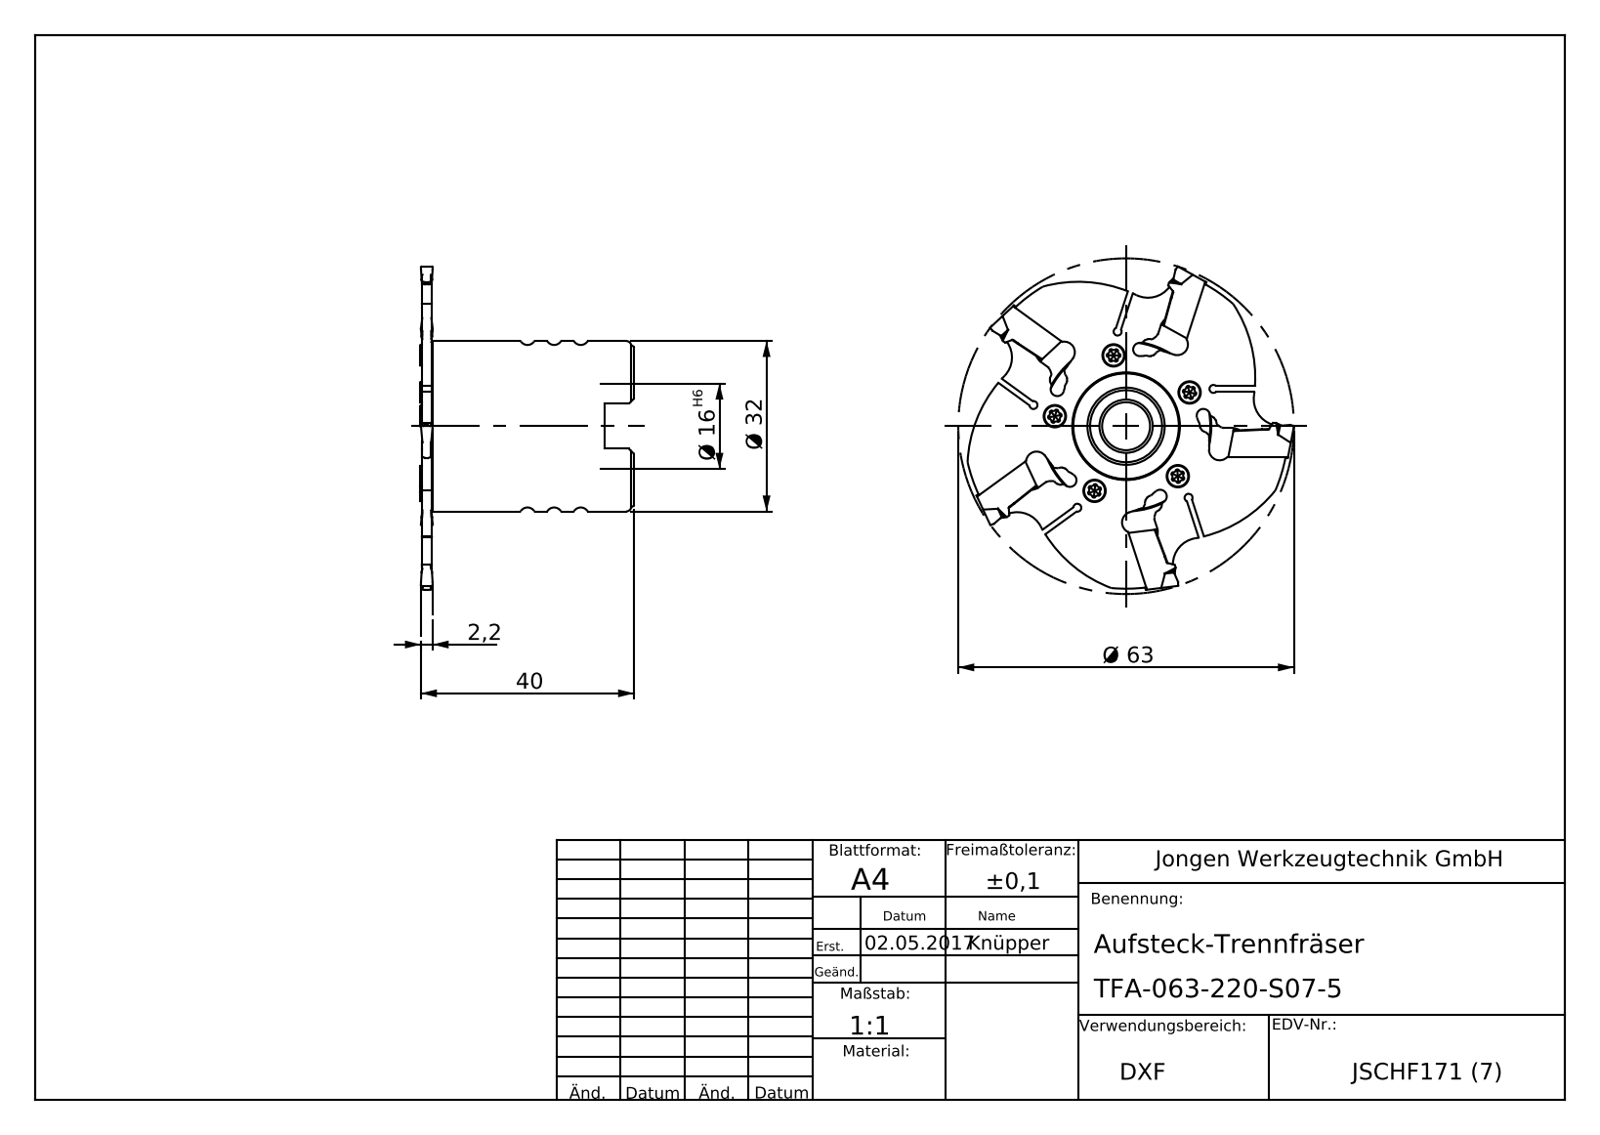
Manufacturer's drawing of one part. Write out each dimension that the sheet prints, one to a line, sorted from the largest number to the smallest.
Ø 63
40
Ø 32
Ø 16 H6
2,2
